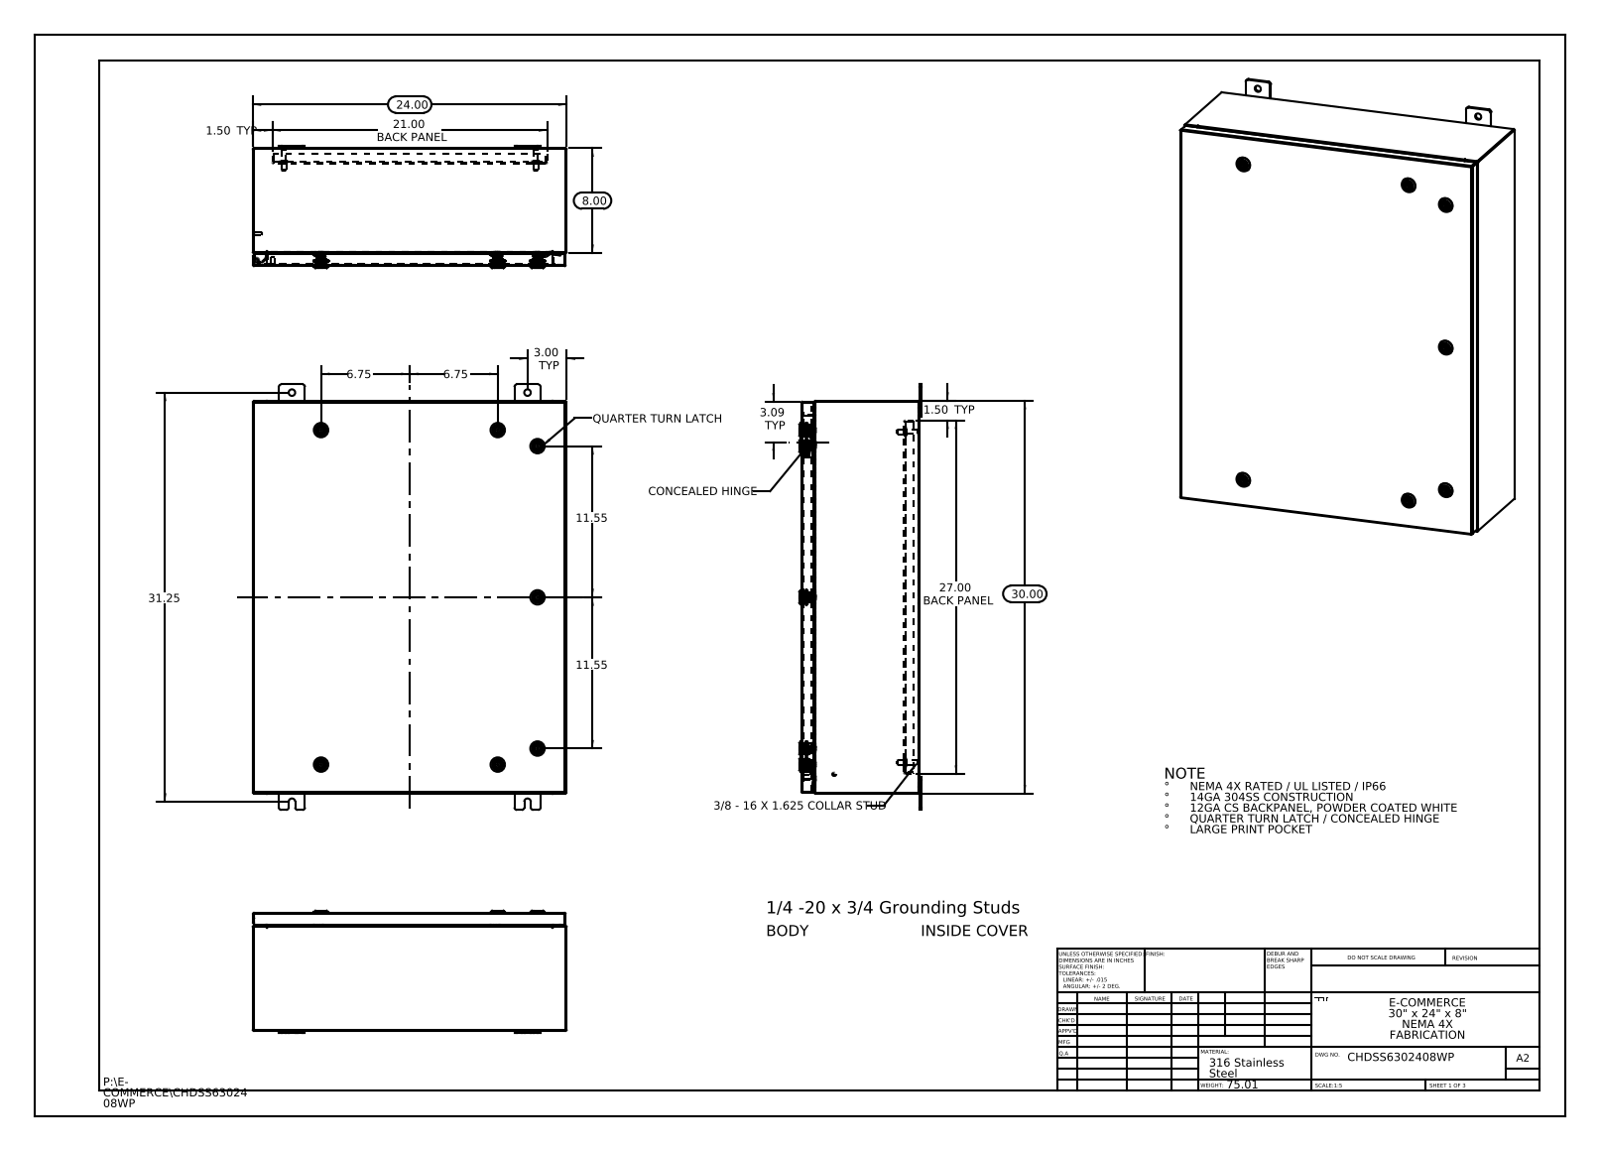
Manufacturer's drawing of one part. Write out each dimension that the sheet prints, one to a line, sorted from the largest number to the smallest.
31.25
30.00
27.00 BACK PANEL
24.00
21.00 BACK PANEL
11.55
11.55
8.00
6.75
6.75
3.09 TYP
3.00 TYP
1.50 TYP
1.50 TYP
